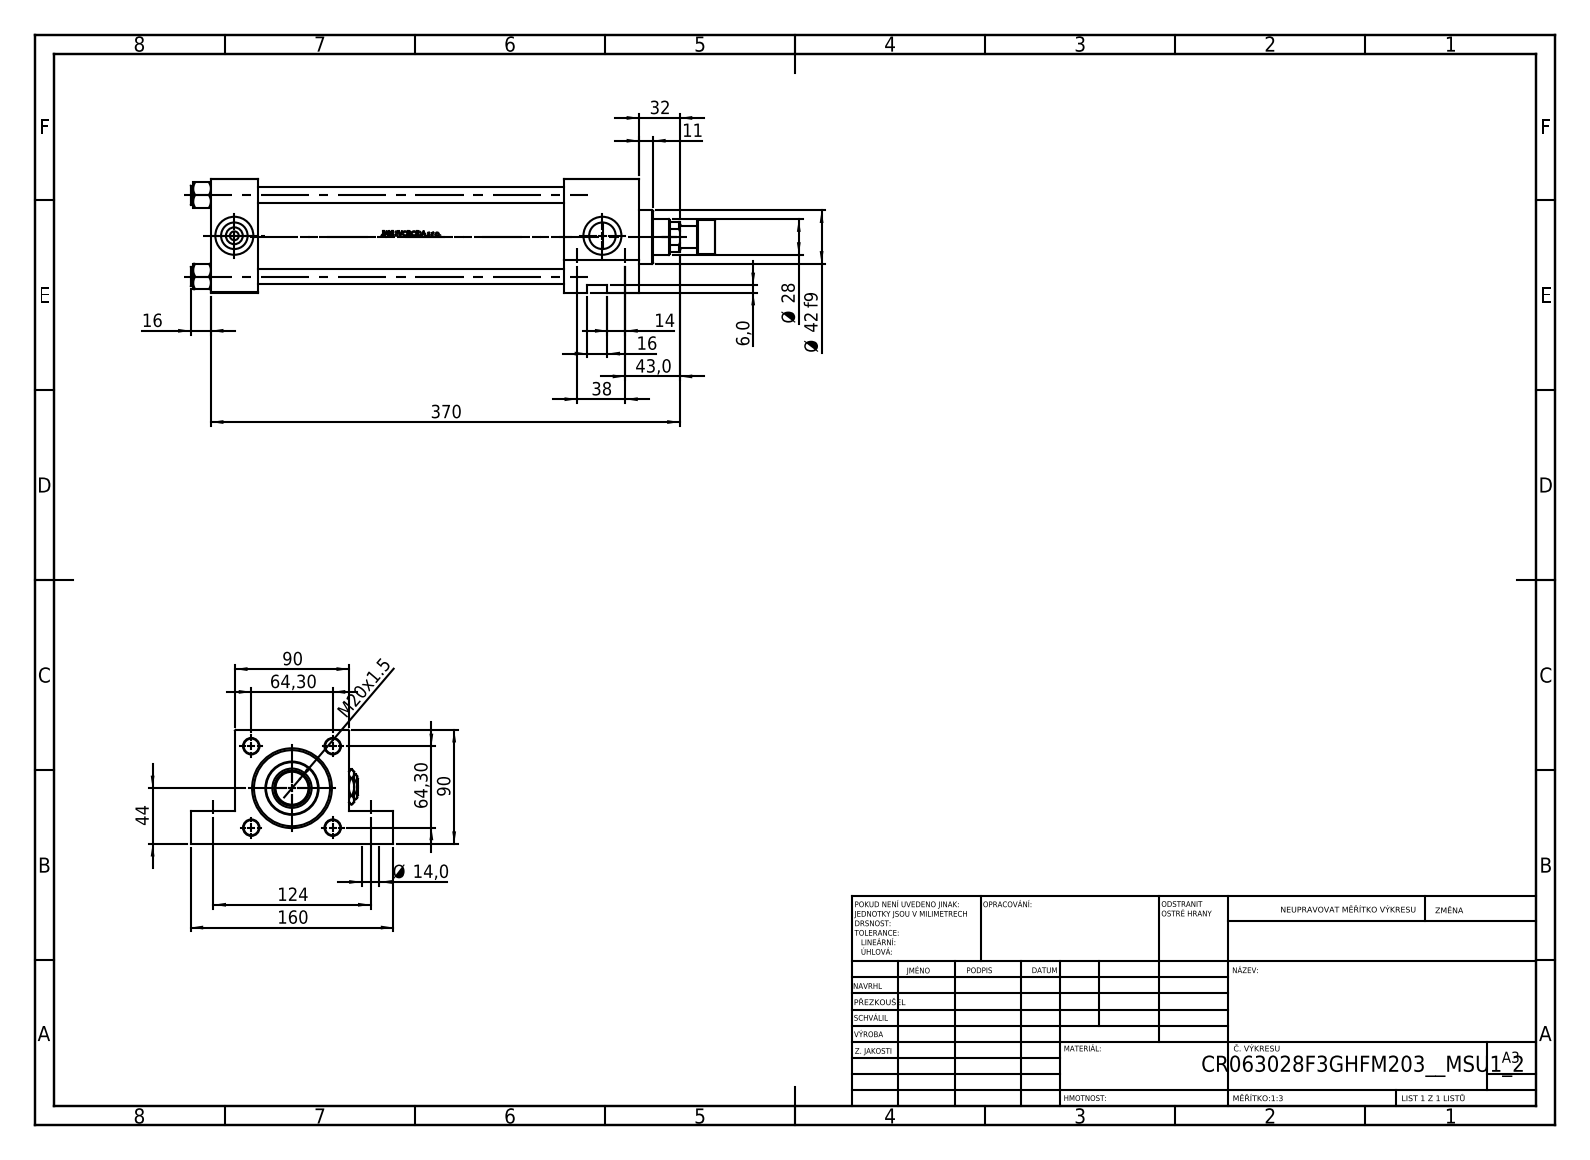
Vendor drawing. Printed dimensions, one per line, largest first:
370
160
124
90
90
64,30
64,30
44
43,0
Ø 42 f9
38
32
Ø 28
M20x1.5
16
16
14
Ø 14,0
11
6,0
